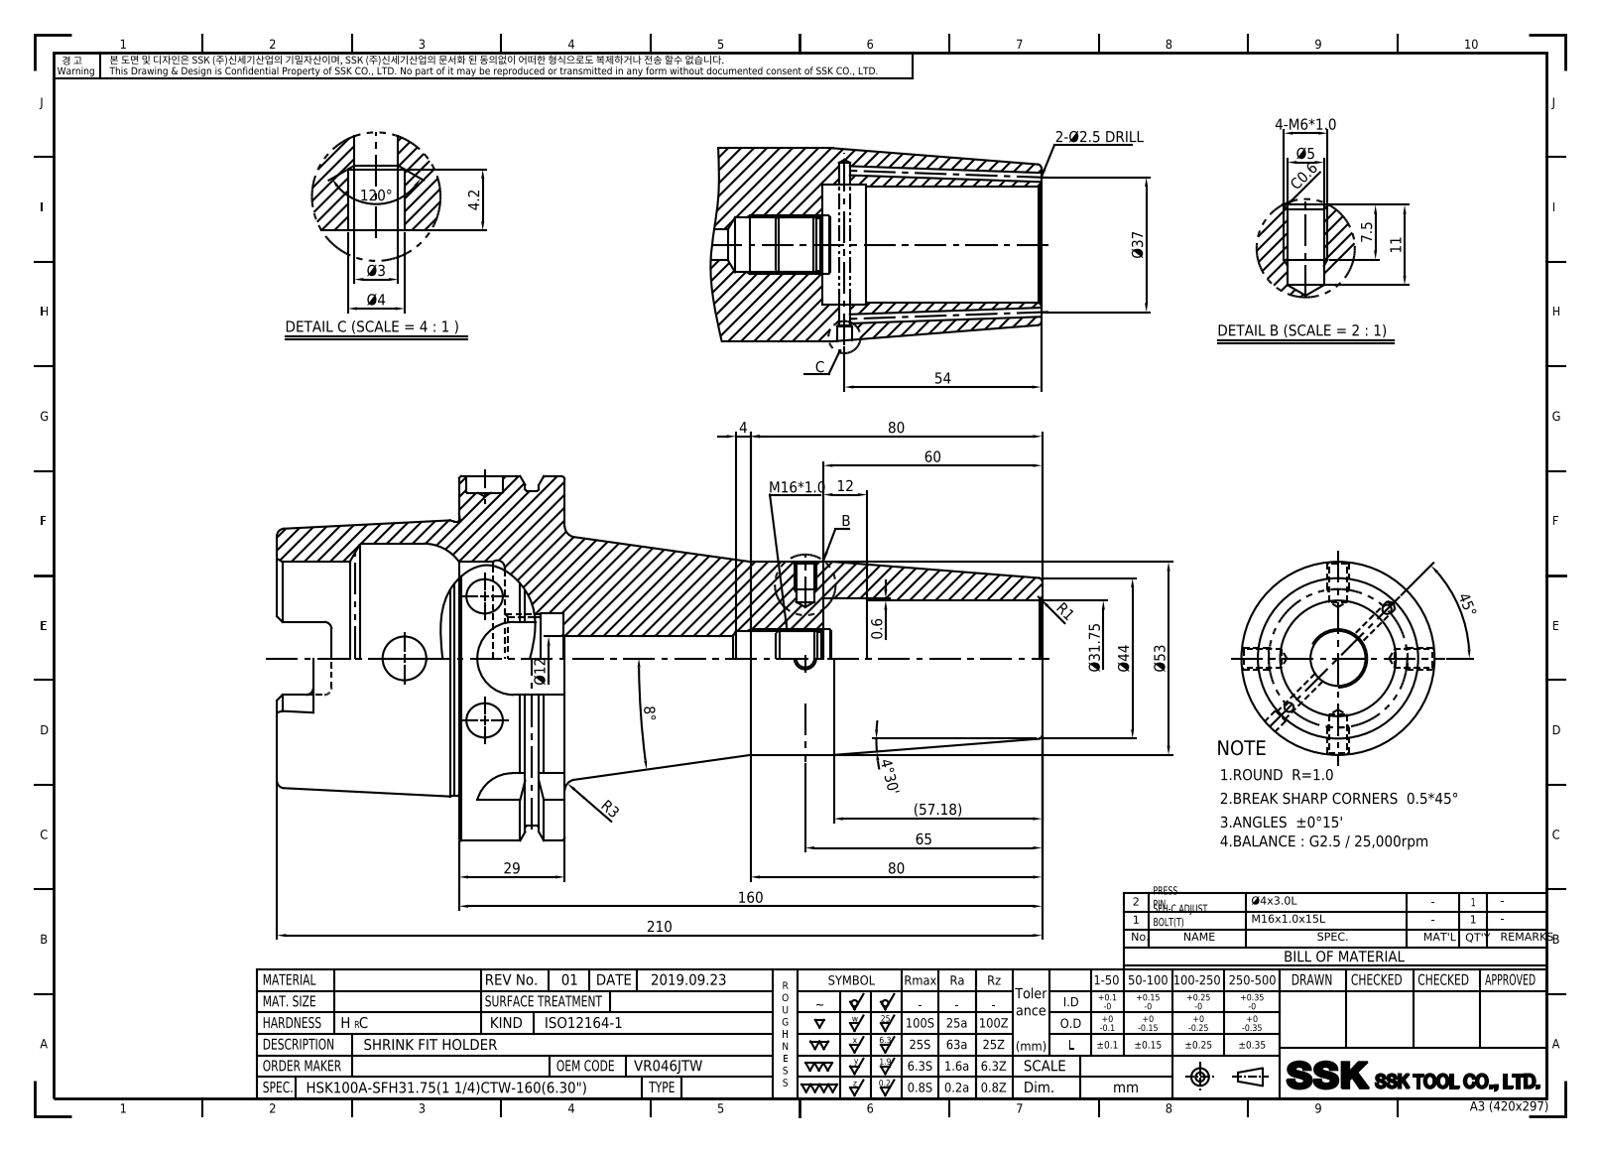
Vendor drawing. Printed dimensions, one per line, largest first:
210
160
120°
80
80
65
60
(57.18)
54
Ø53
45°
Ø44
Ø37
Ø31.75
29
Ø12
12
11
8°
7.5
4-M6*1.0
Ø5
4.2
4°30'
Ø4
4
Ø3
R3
R1
0.6
C0.6
